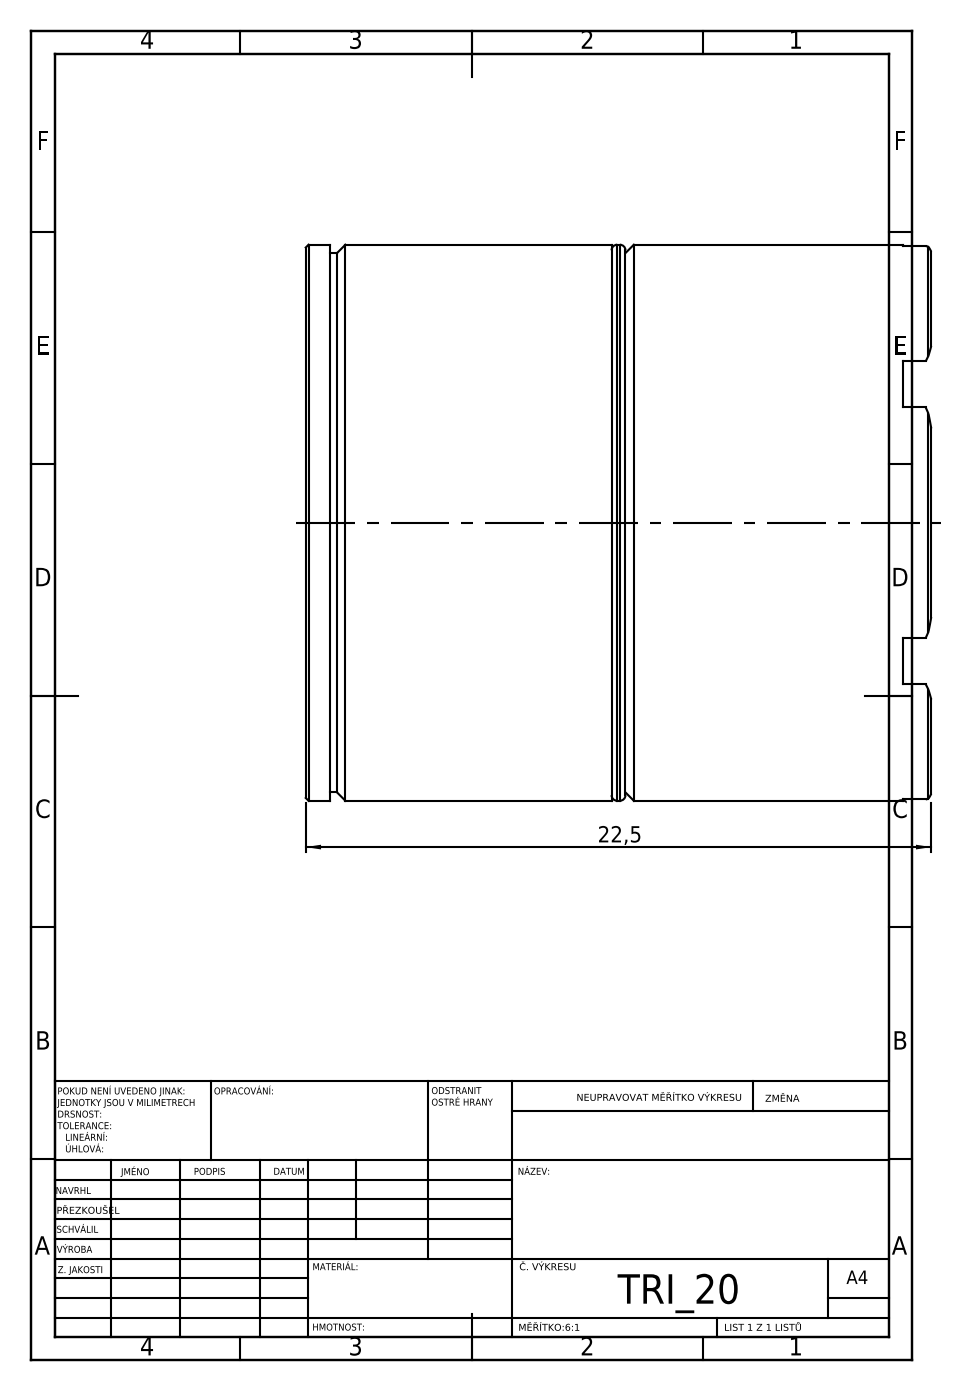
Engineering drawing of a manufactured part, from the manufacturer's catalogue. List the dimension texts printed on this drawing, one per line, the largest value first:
22,5
